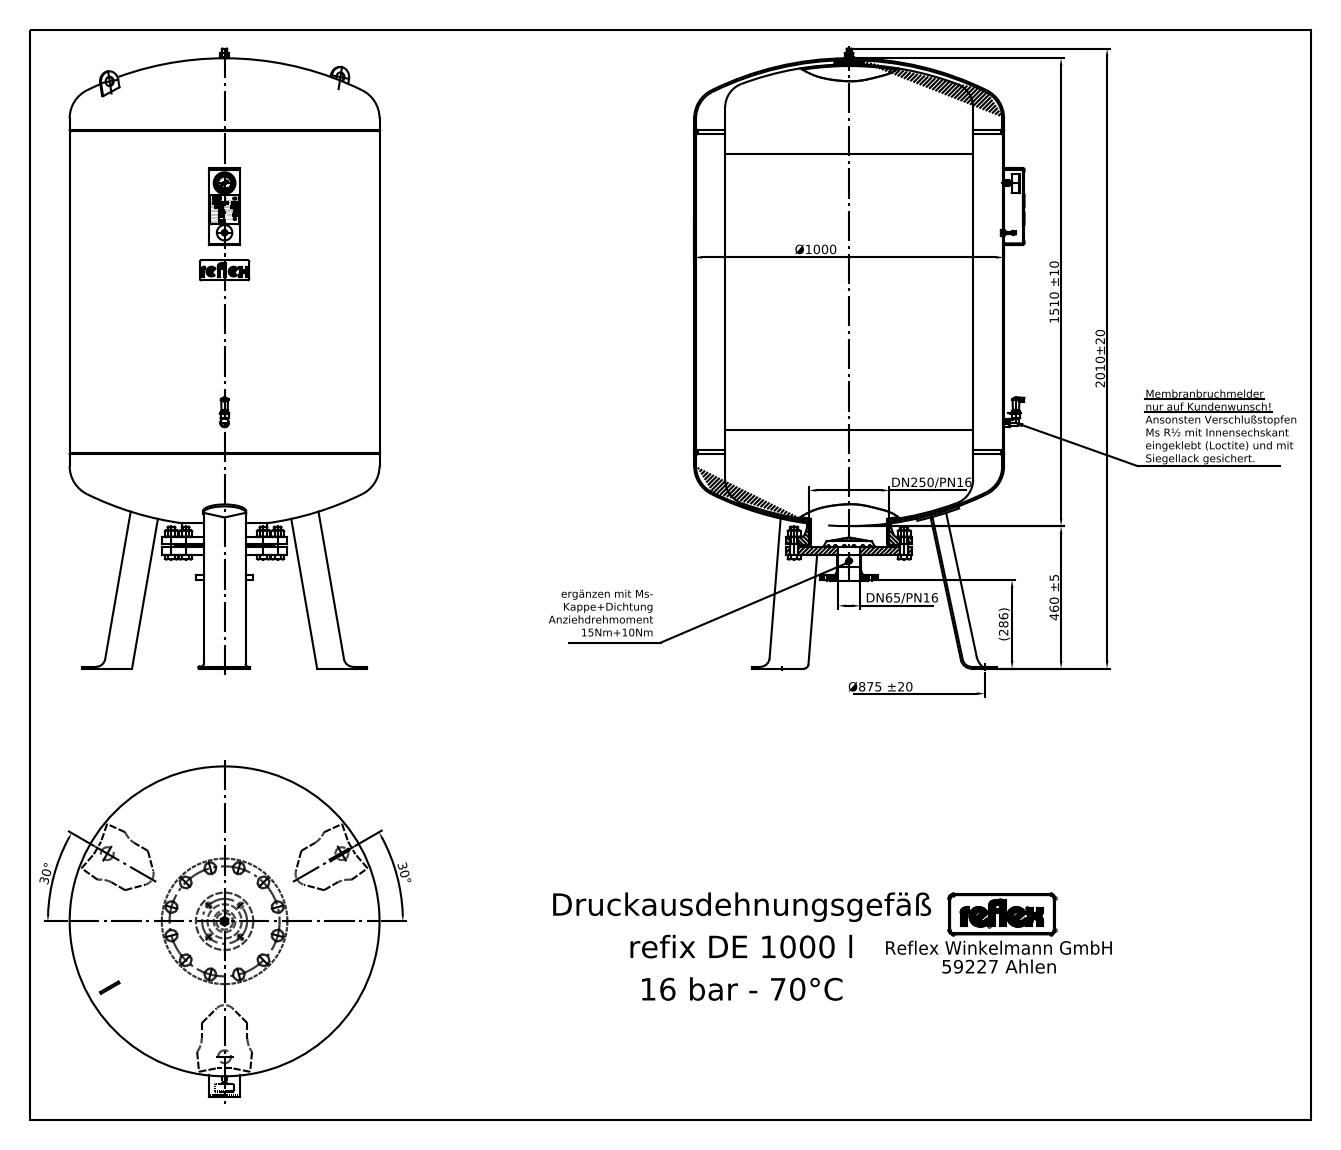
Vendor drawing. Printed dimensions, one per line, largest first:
2010±20
1510 ±10
Ø1000
Ø875 ±20
460 ±5
(286)
DN250/PN16
DN65/PN16
30°
30°
